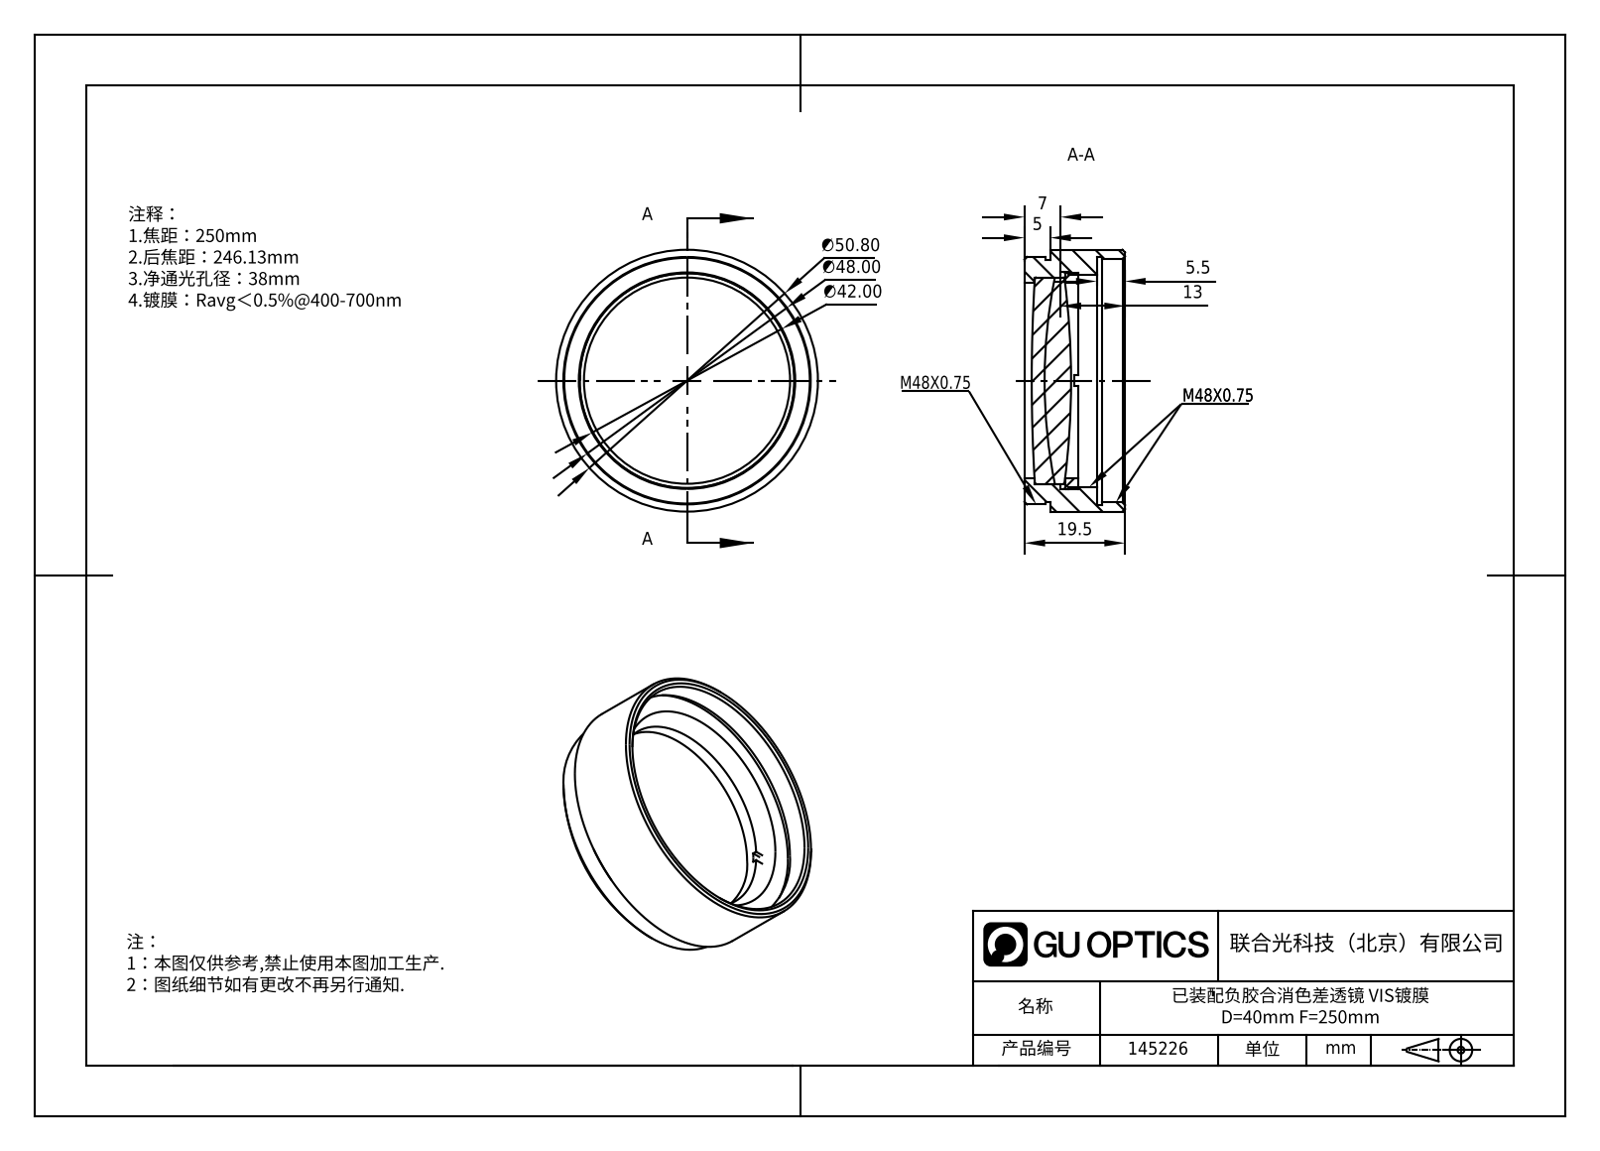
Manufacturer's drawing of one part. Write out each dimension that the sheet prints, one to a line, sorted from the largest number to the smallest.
∅50.80
∅48.00
∅42.00
19.5
13
7
5.5
5
